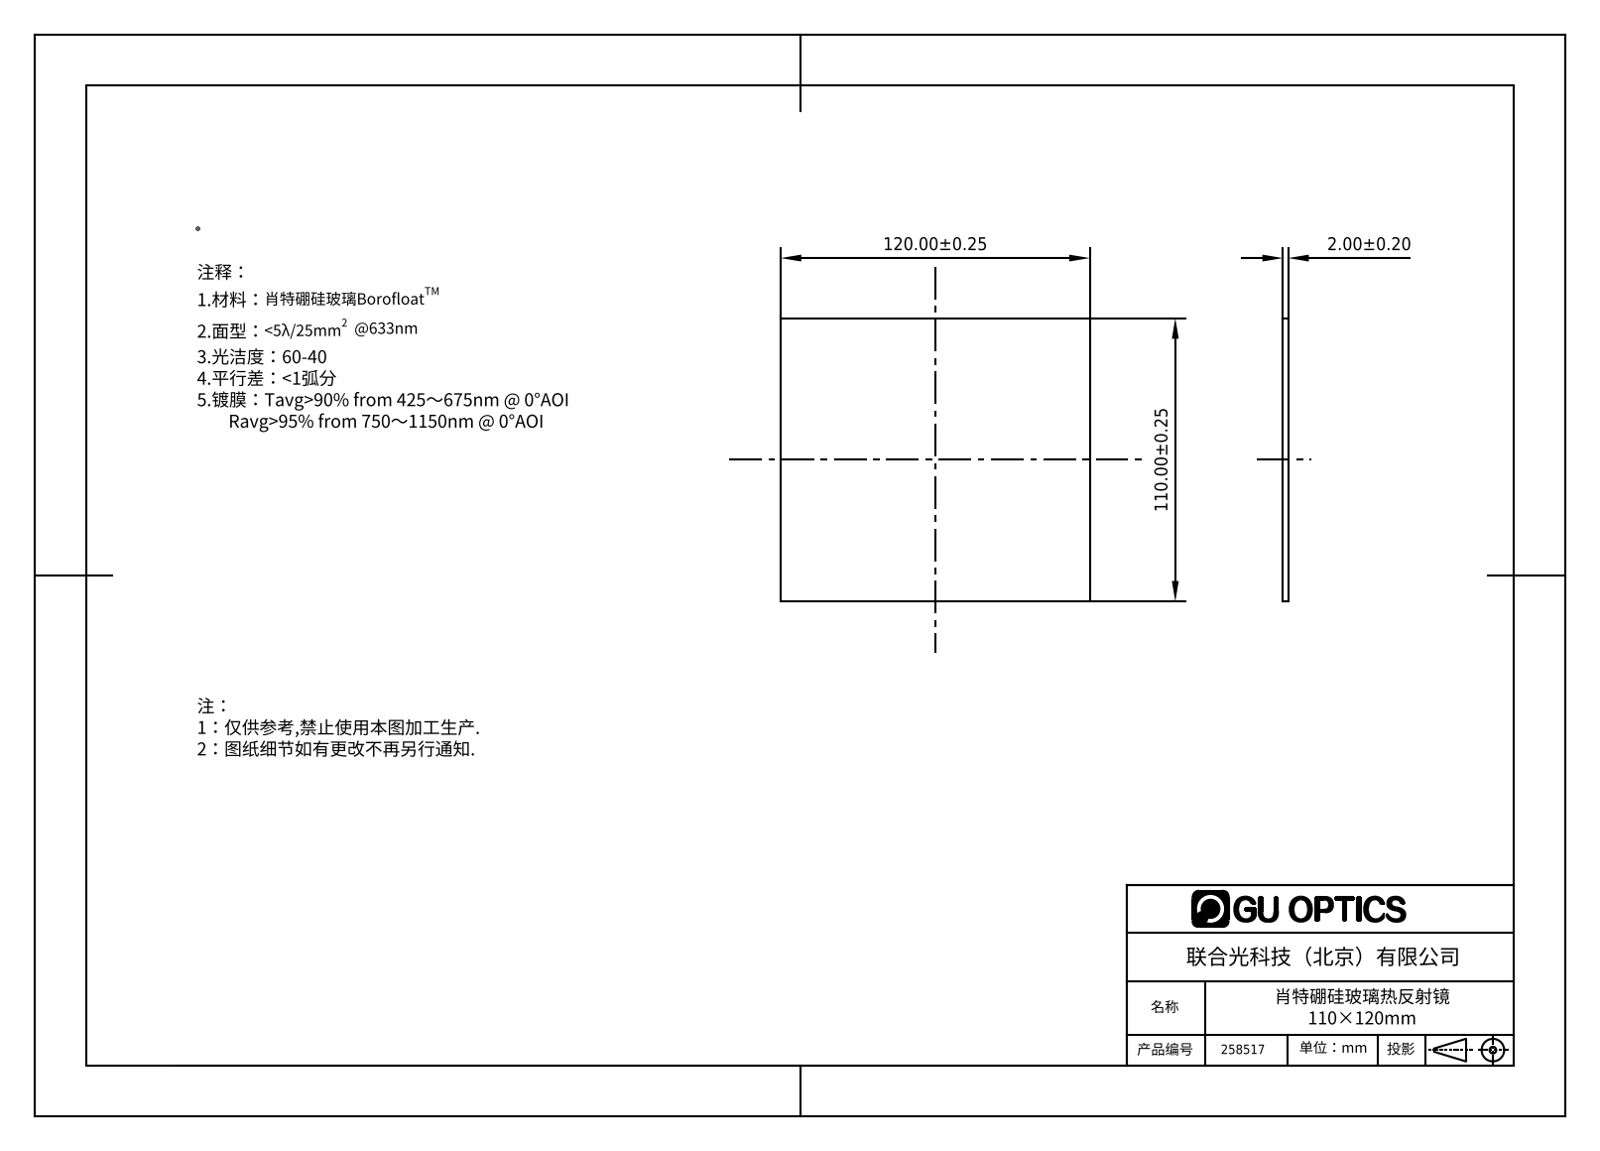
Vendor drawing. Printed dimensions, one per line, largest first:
120.00±0.25
110.00±0.25
2.00±0.20
